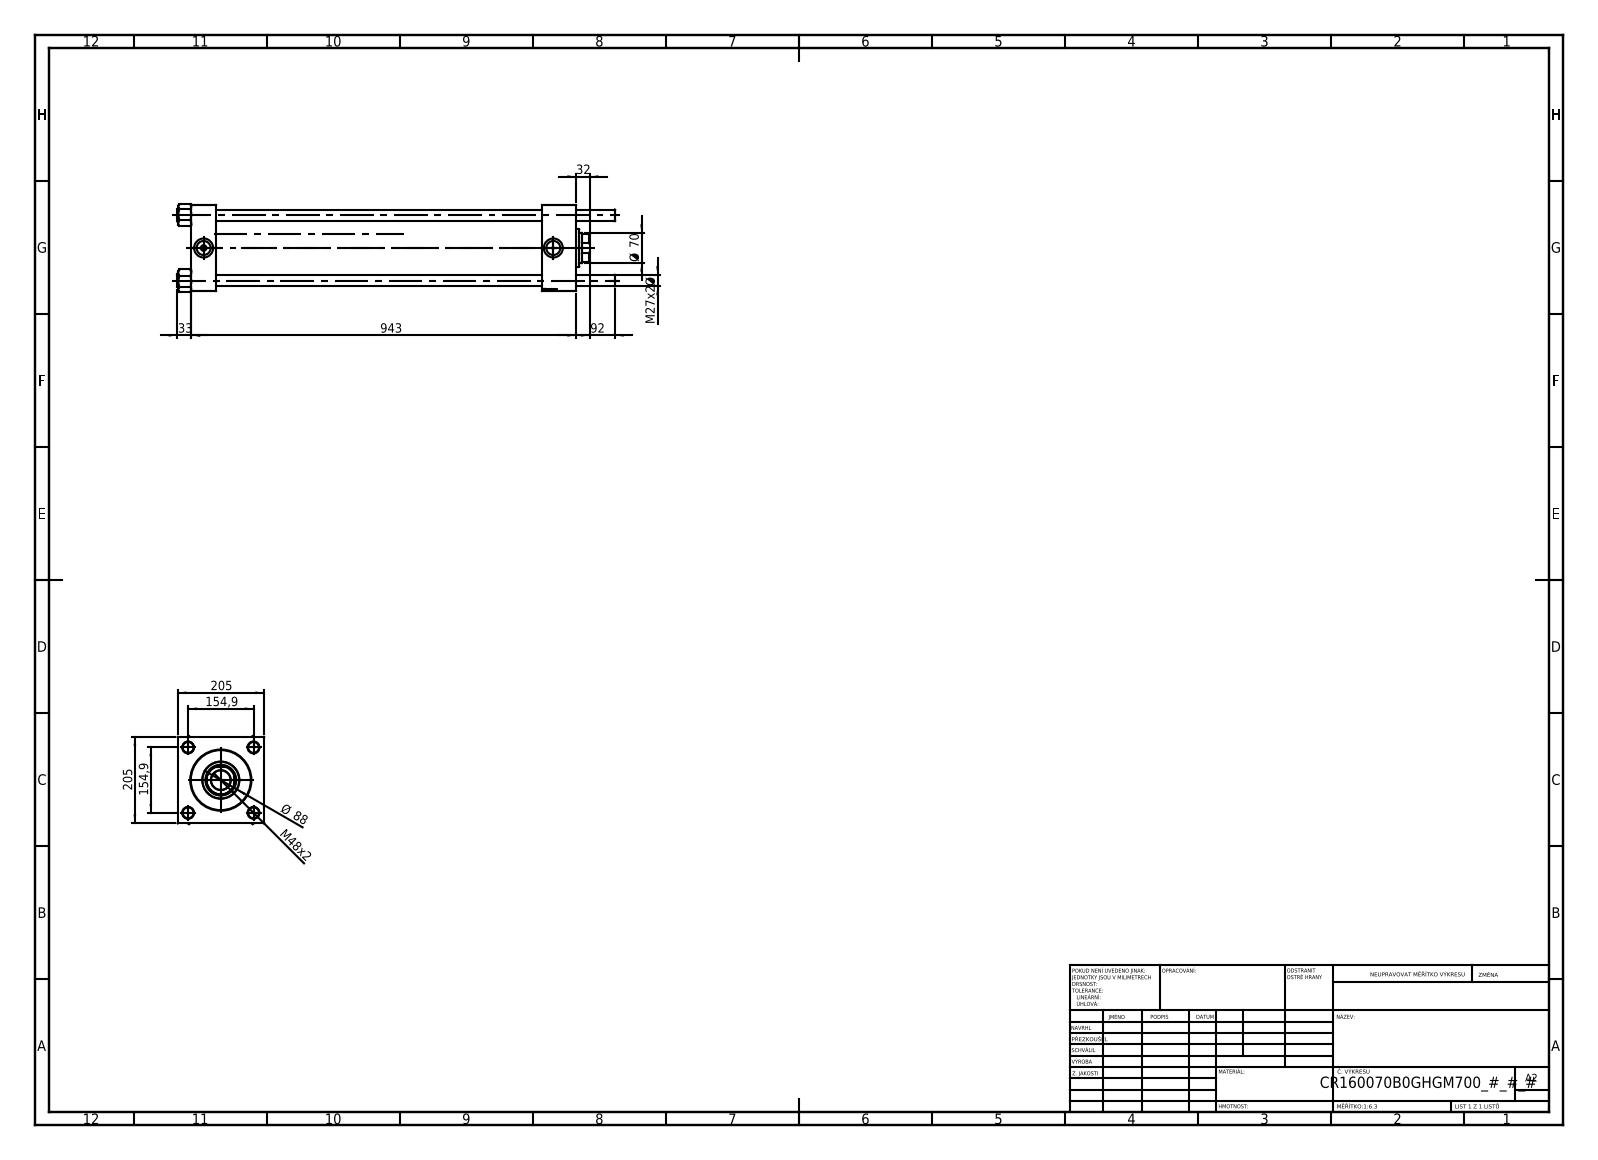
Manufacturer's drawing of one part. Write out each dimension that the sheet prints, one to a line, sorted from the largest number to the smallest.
943
205
205
154,9
154,9
92
Ø 88
Ø 70
M48x2
33
32
M27x2 Ø
